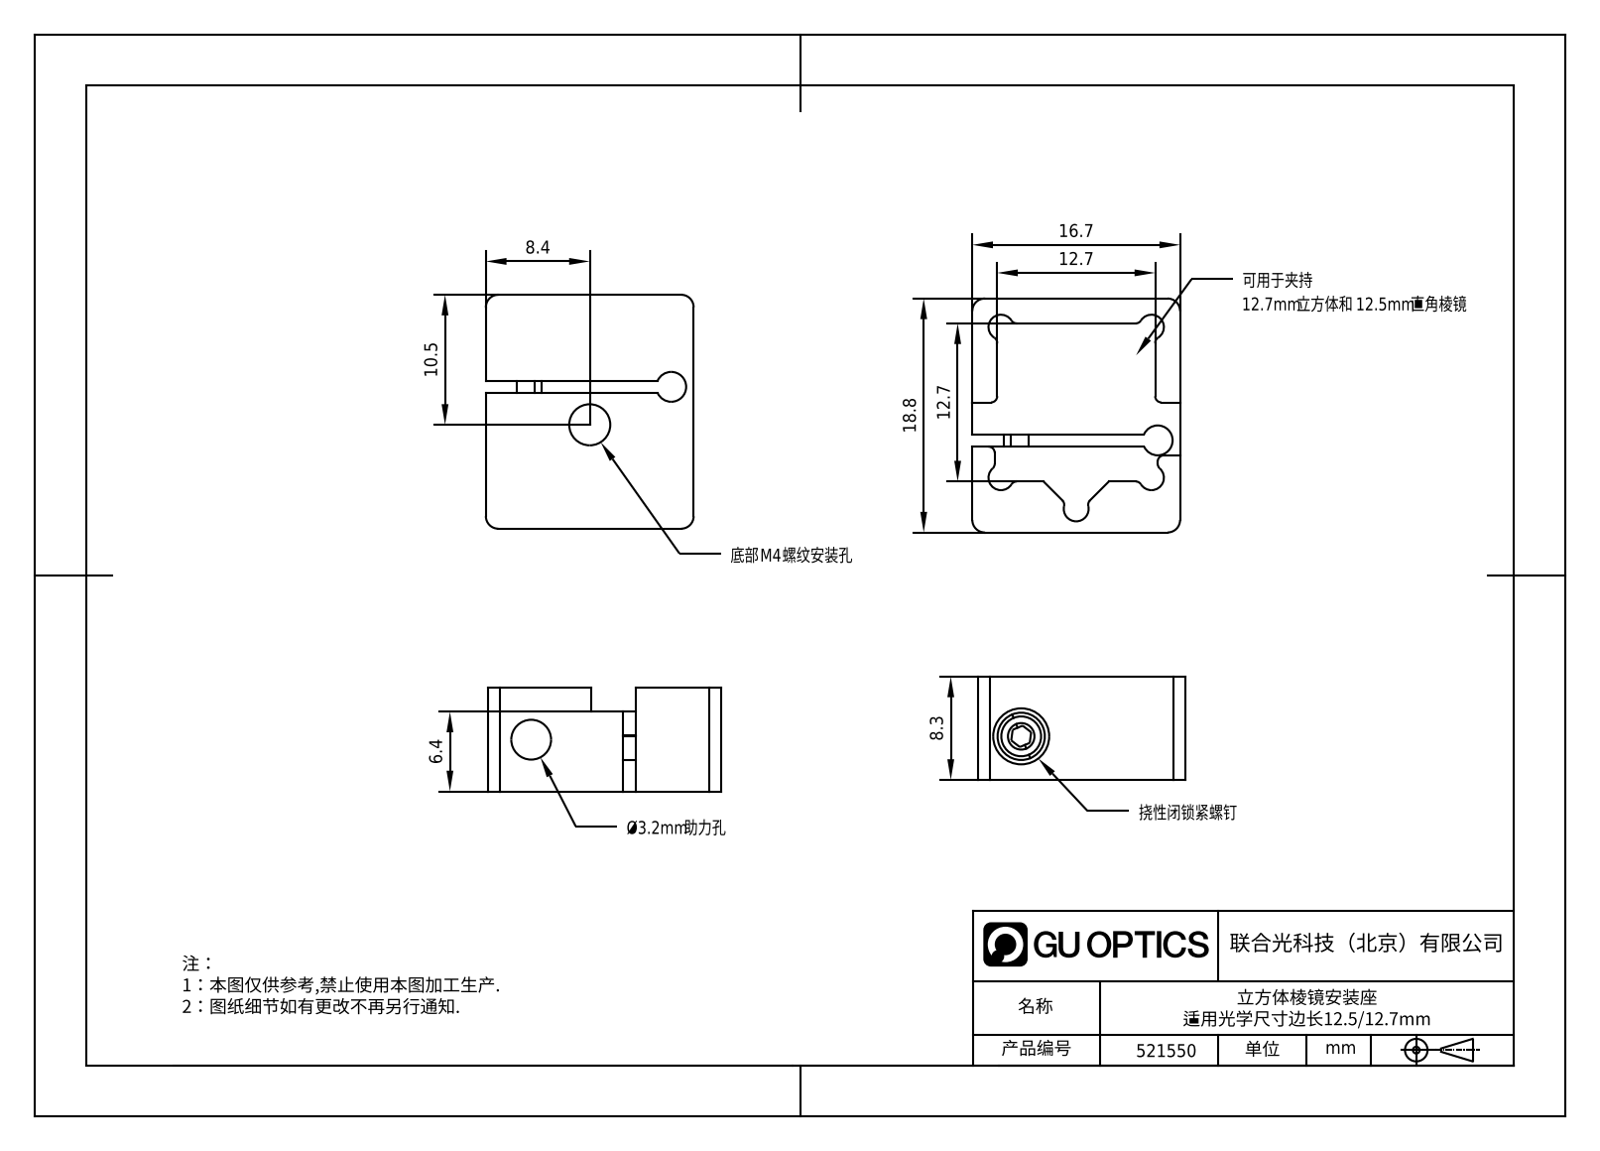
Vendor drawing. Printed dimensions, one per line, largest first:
18.8
16.7
12.7
12.7
10.5
8.4
8.3
6.4
